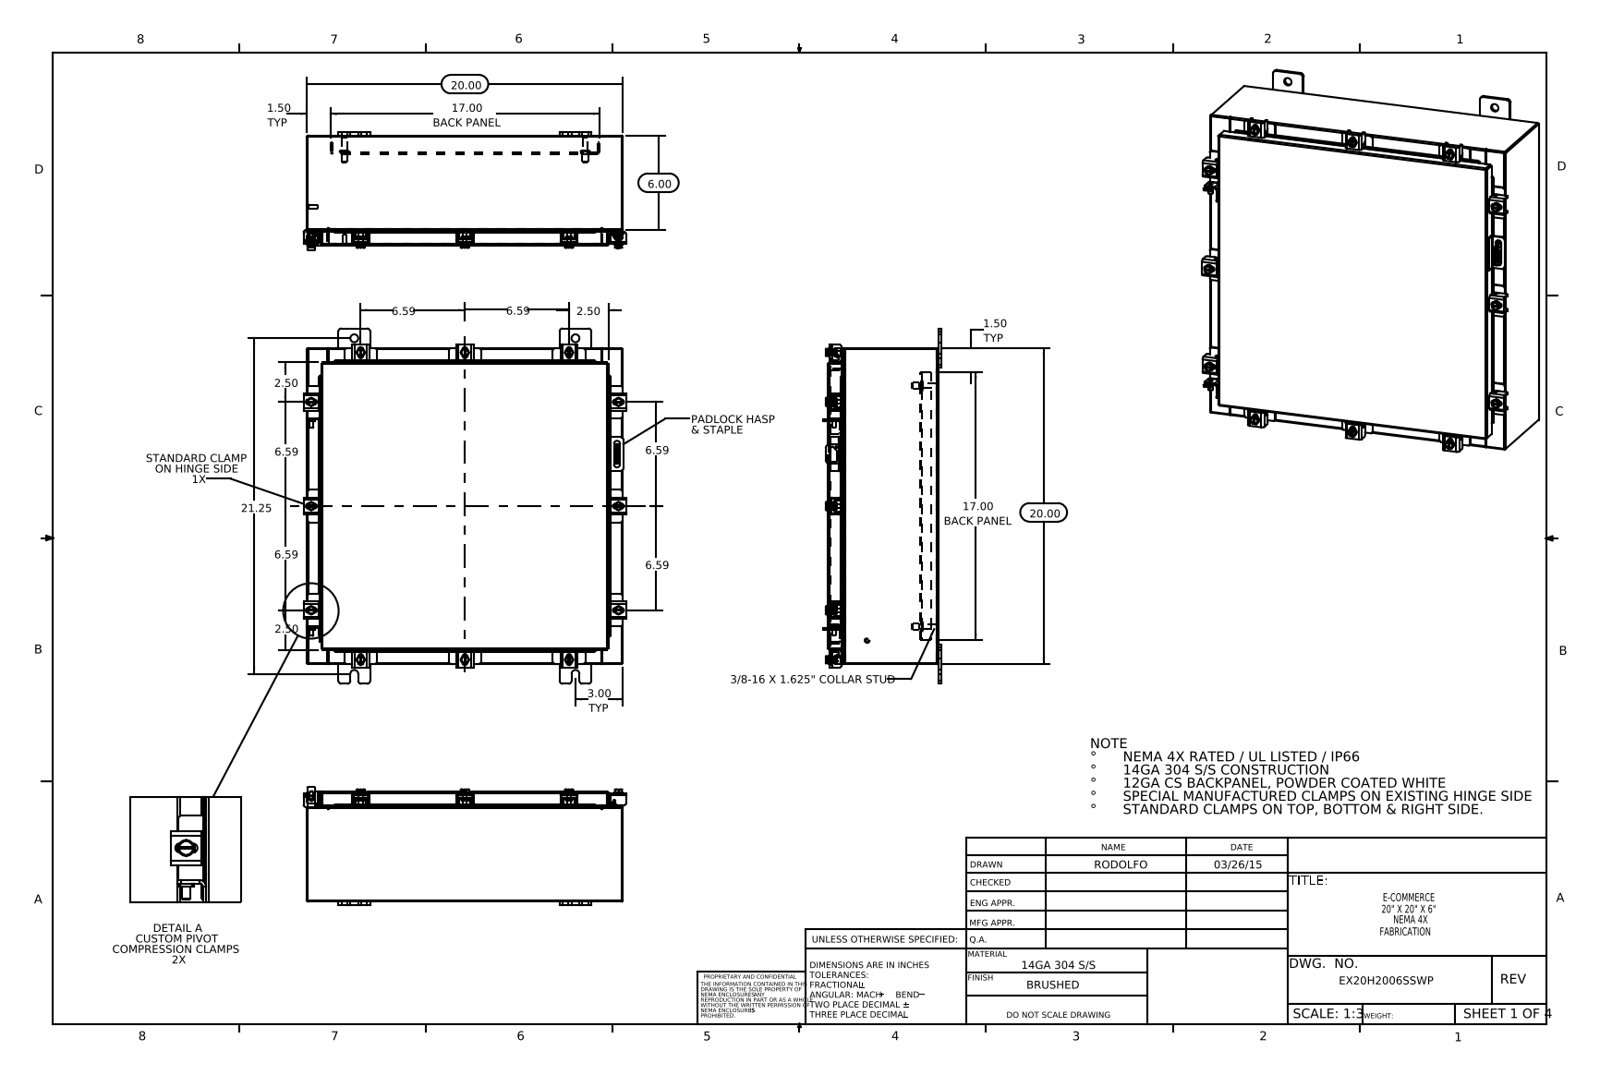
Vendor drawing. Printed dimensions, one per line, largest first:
21.25
20.00
20.00
17.00 BACK PANEL
17.00 BACK PANEL
6.59
6.59
6.59
6.59
6.59
6.59
6.00
3.00 TYP
2.50
2.50
2.50
1.50 TYP
1.50 TYP
